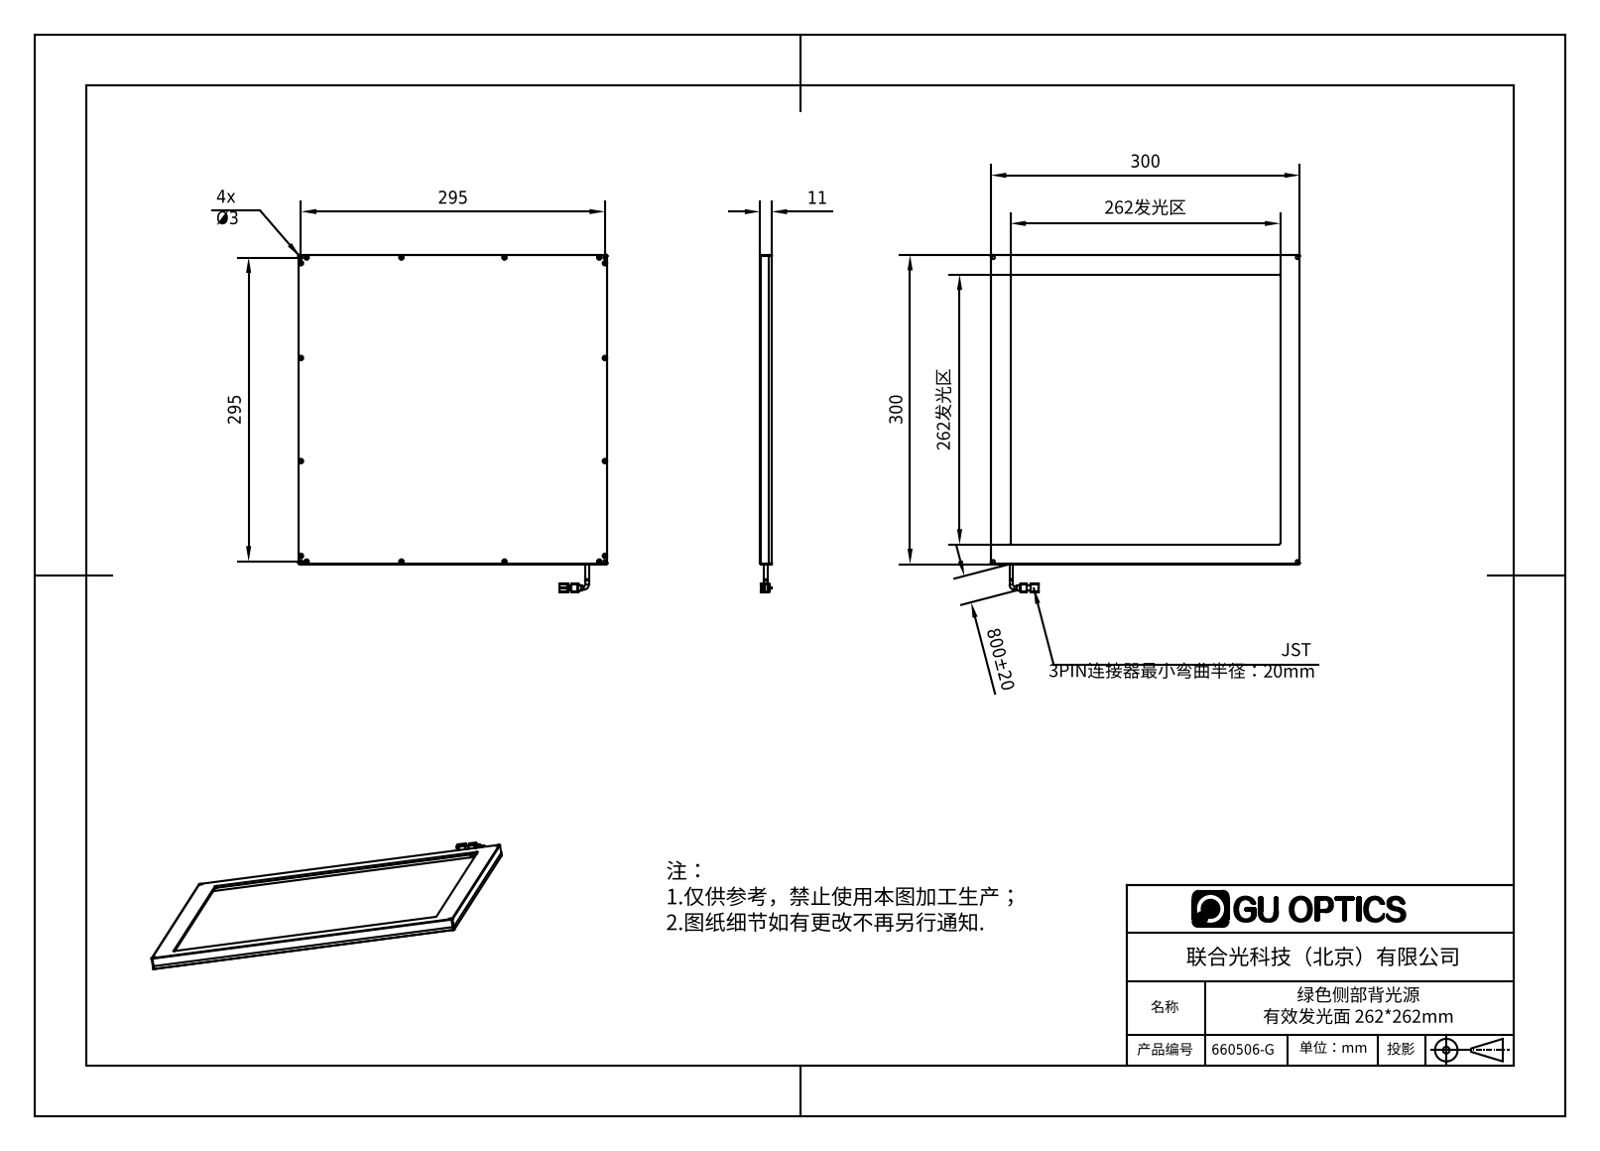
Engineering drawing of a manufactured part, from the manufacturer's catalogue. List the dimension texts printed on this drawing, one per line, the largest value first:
800±20
300
300
295
295
262发光区
262发光区
11
